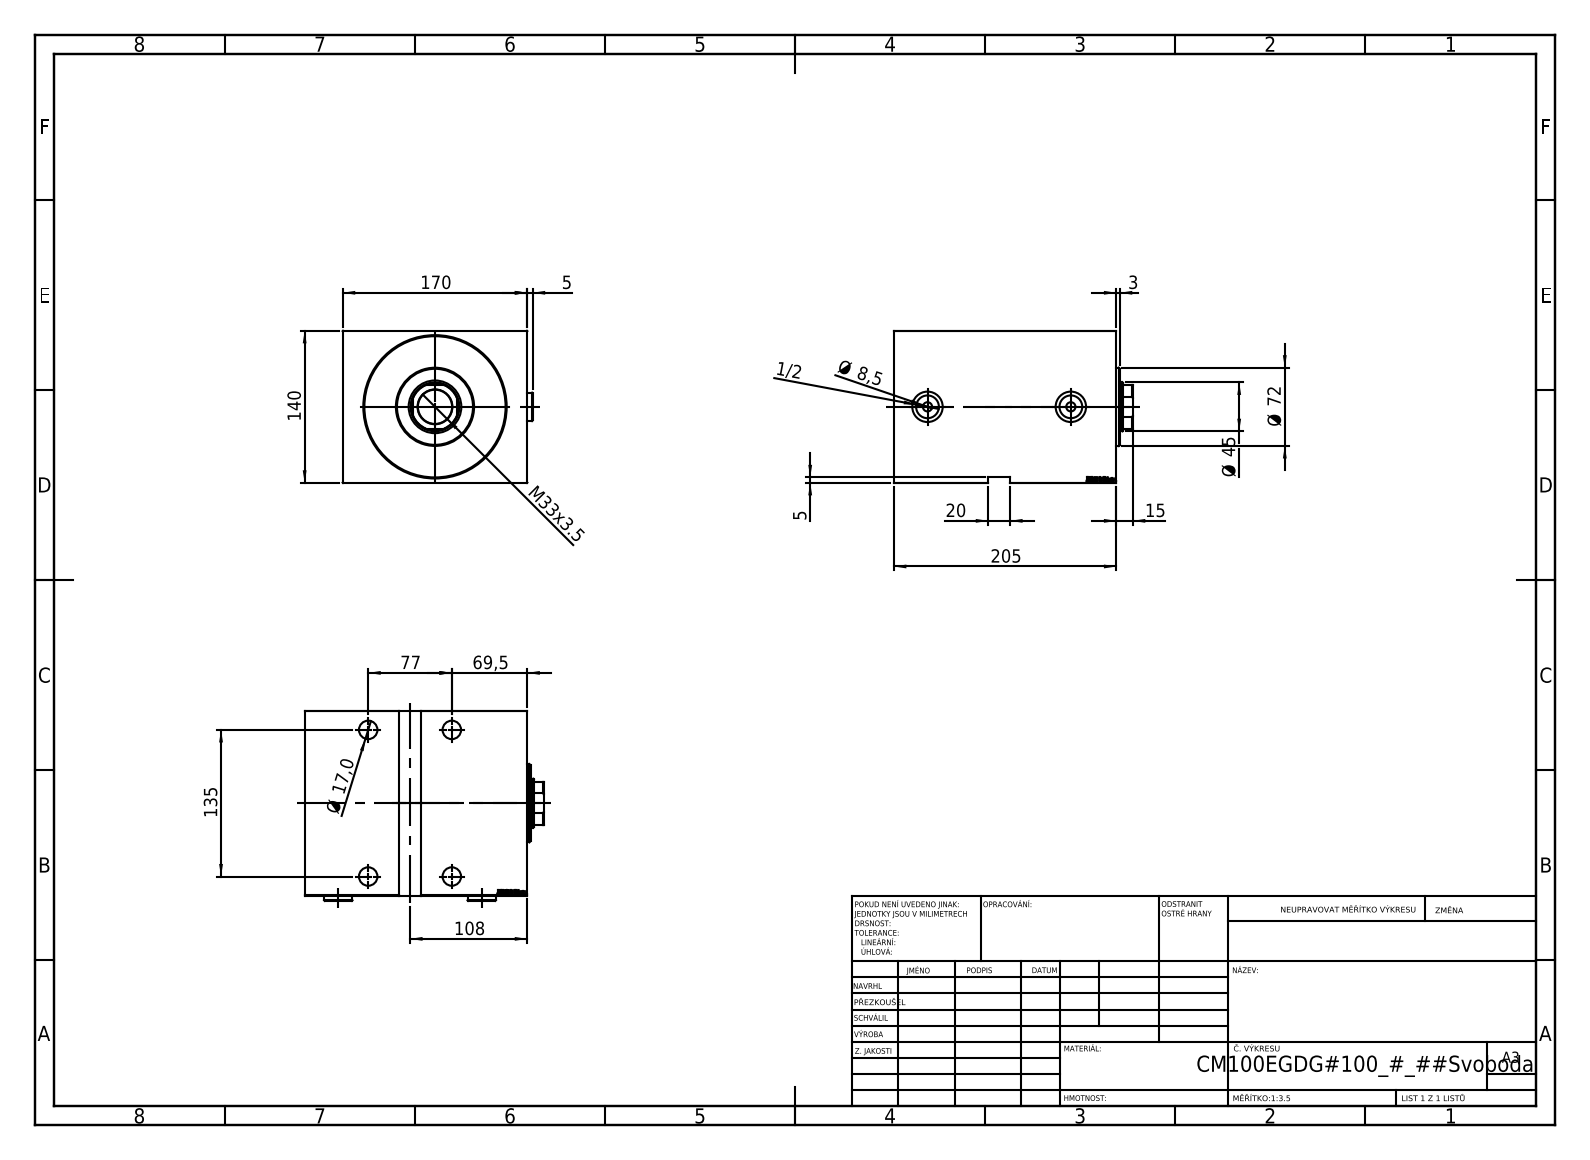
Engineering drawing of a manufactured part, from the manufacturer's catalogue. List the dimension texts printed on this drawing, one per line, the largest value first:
205
170
140
135
108
77
Ø 72
69,5
Ø 45
M33x3.5
20
Ø 17,0
15
Ø 8,5
5
5
3
1/2
